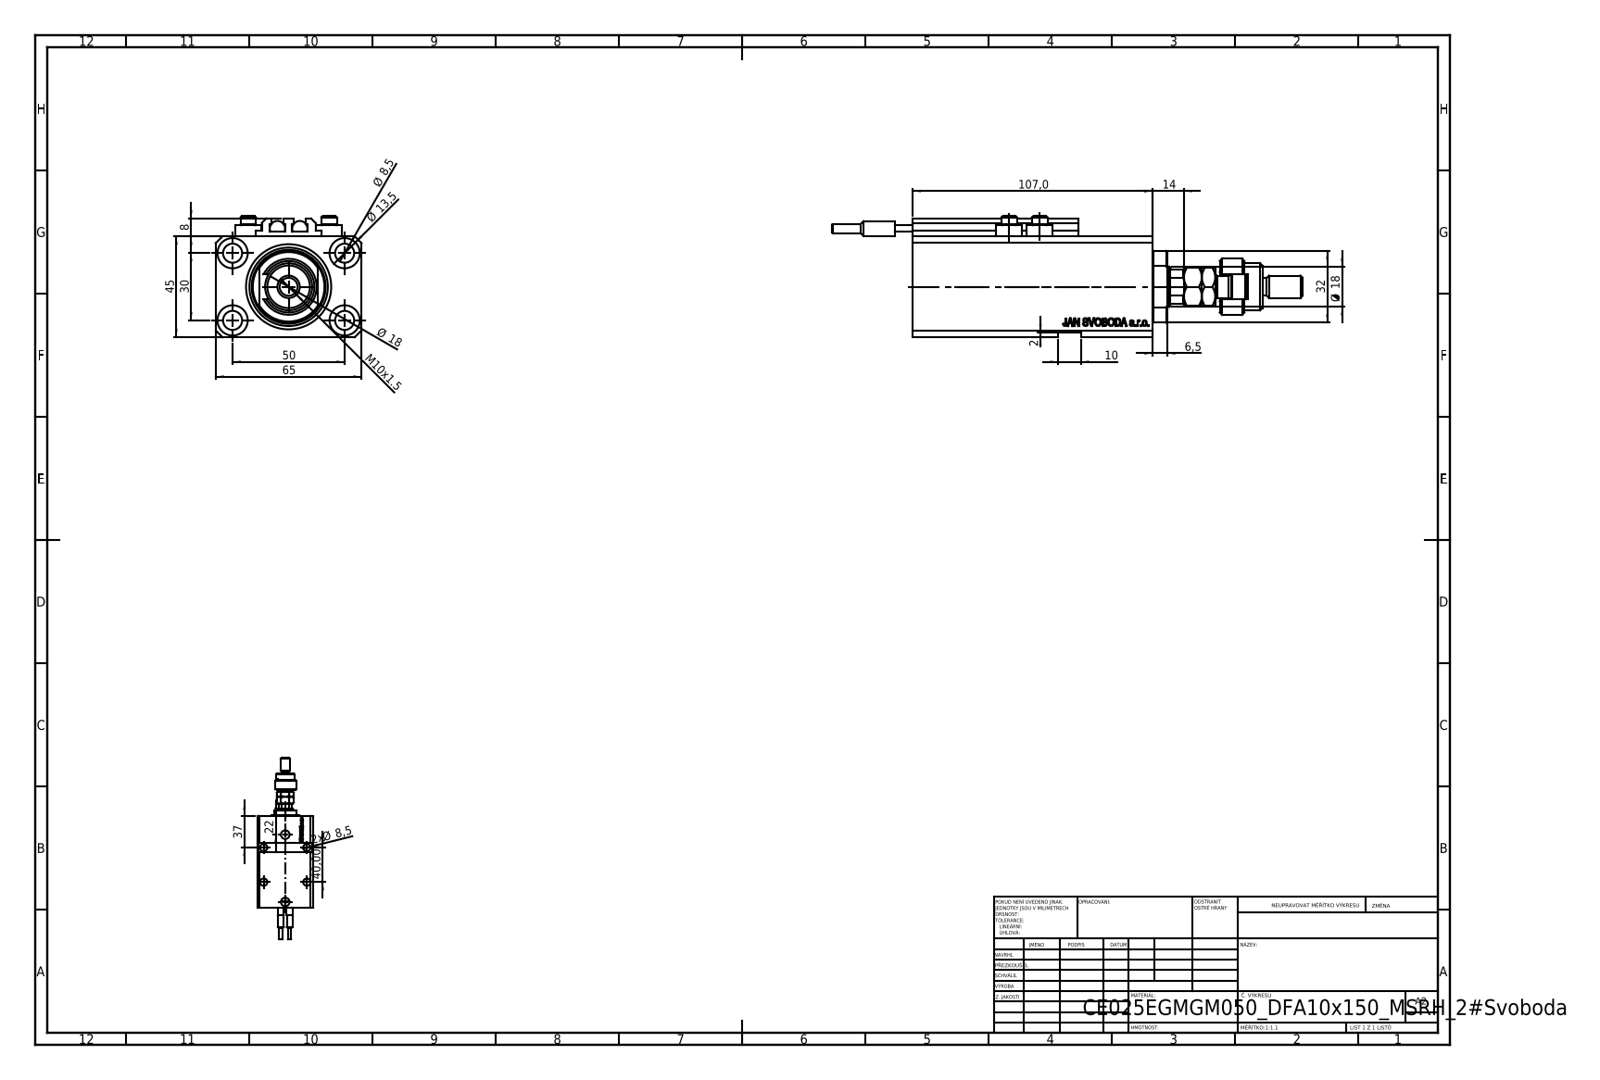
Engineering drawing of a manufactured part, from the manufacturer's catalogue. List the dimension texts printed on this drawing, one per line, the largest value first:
107,0
65
50
45
40,00
37
32
30
22
Ø 18
Ø 18
14
Ø 13,5
M10x1.5
10
Ø 8,5
2x Ø 8,5
8
6,5
2
